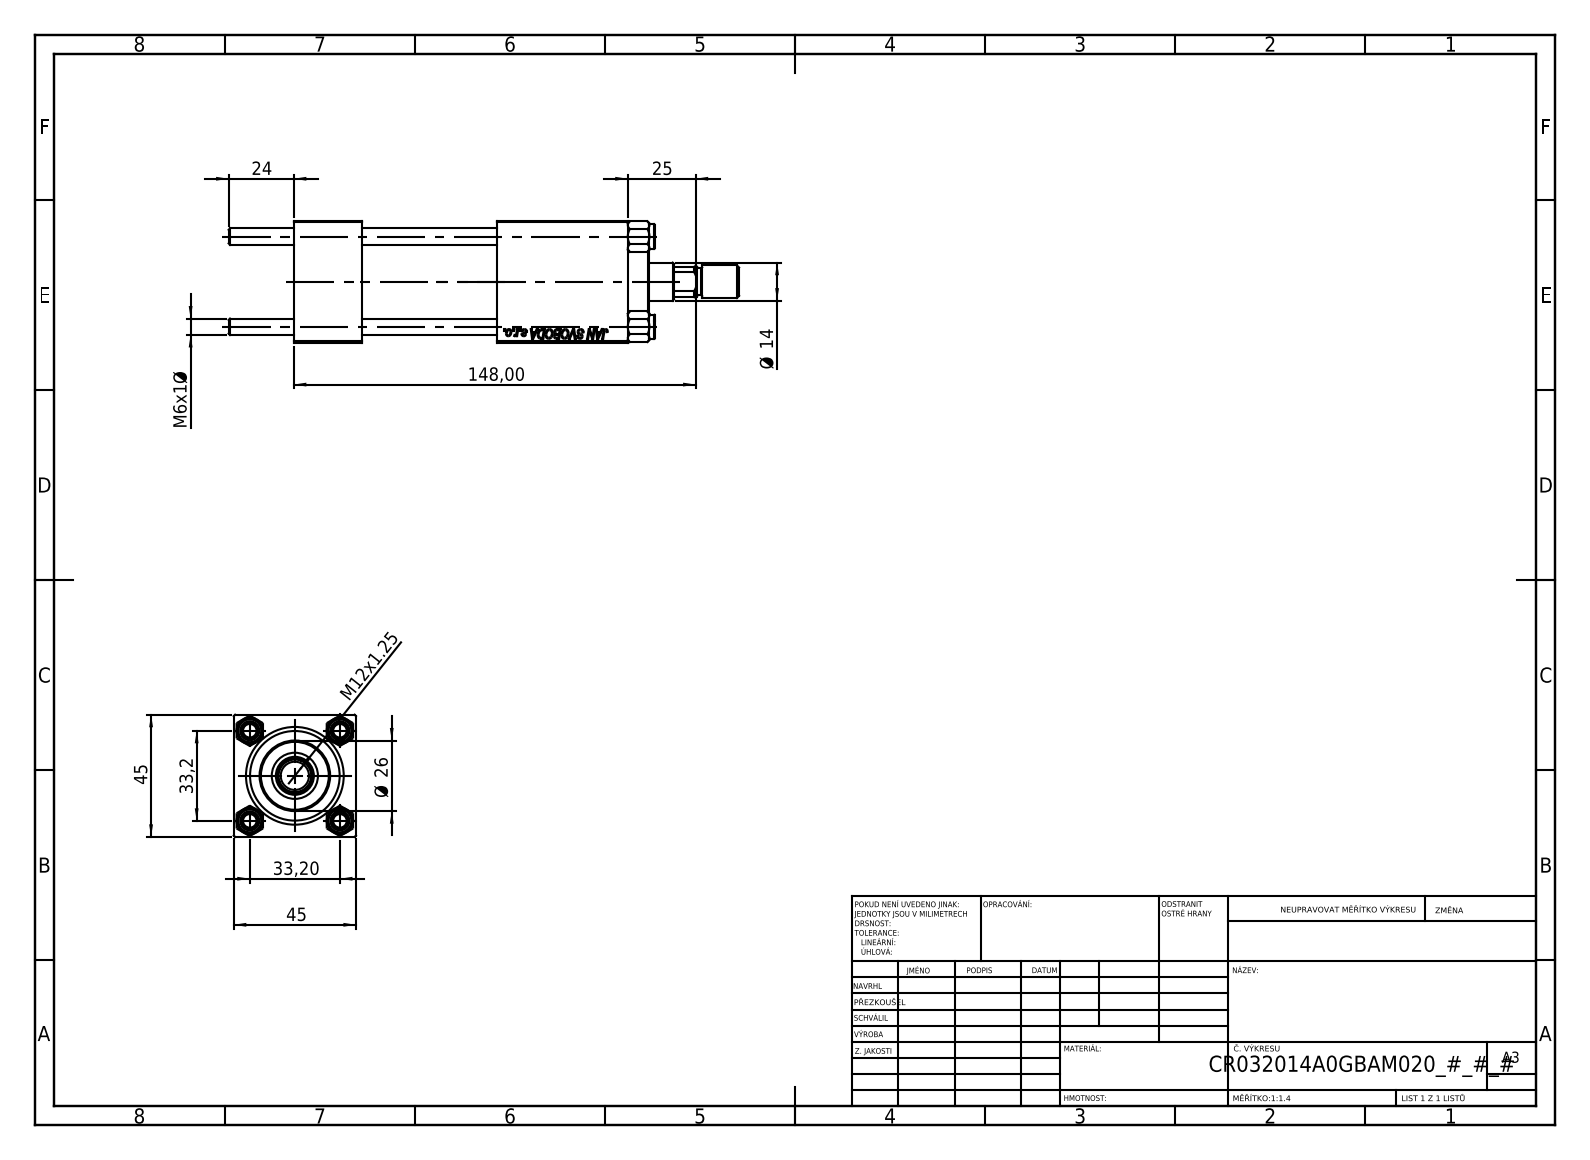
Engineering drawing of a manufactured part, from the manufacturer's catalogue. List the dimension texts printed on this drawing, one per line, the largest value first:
148,00
45
45
33,2
33,20
Ø 26
25
24
Ø 14
M12x1.25
M6x1 Ø
